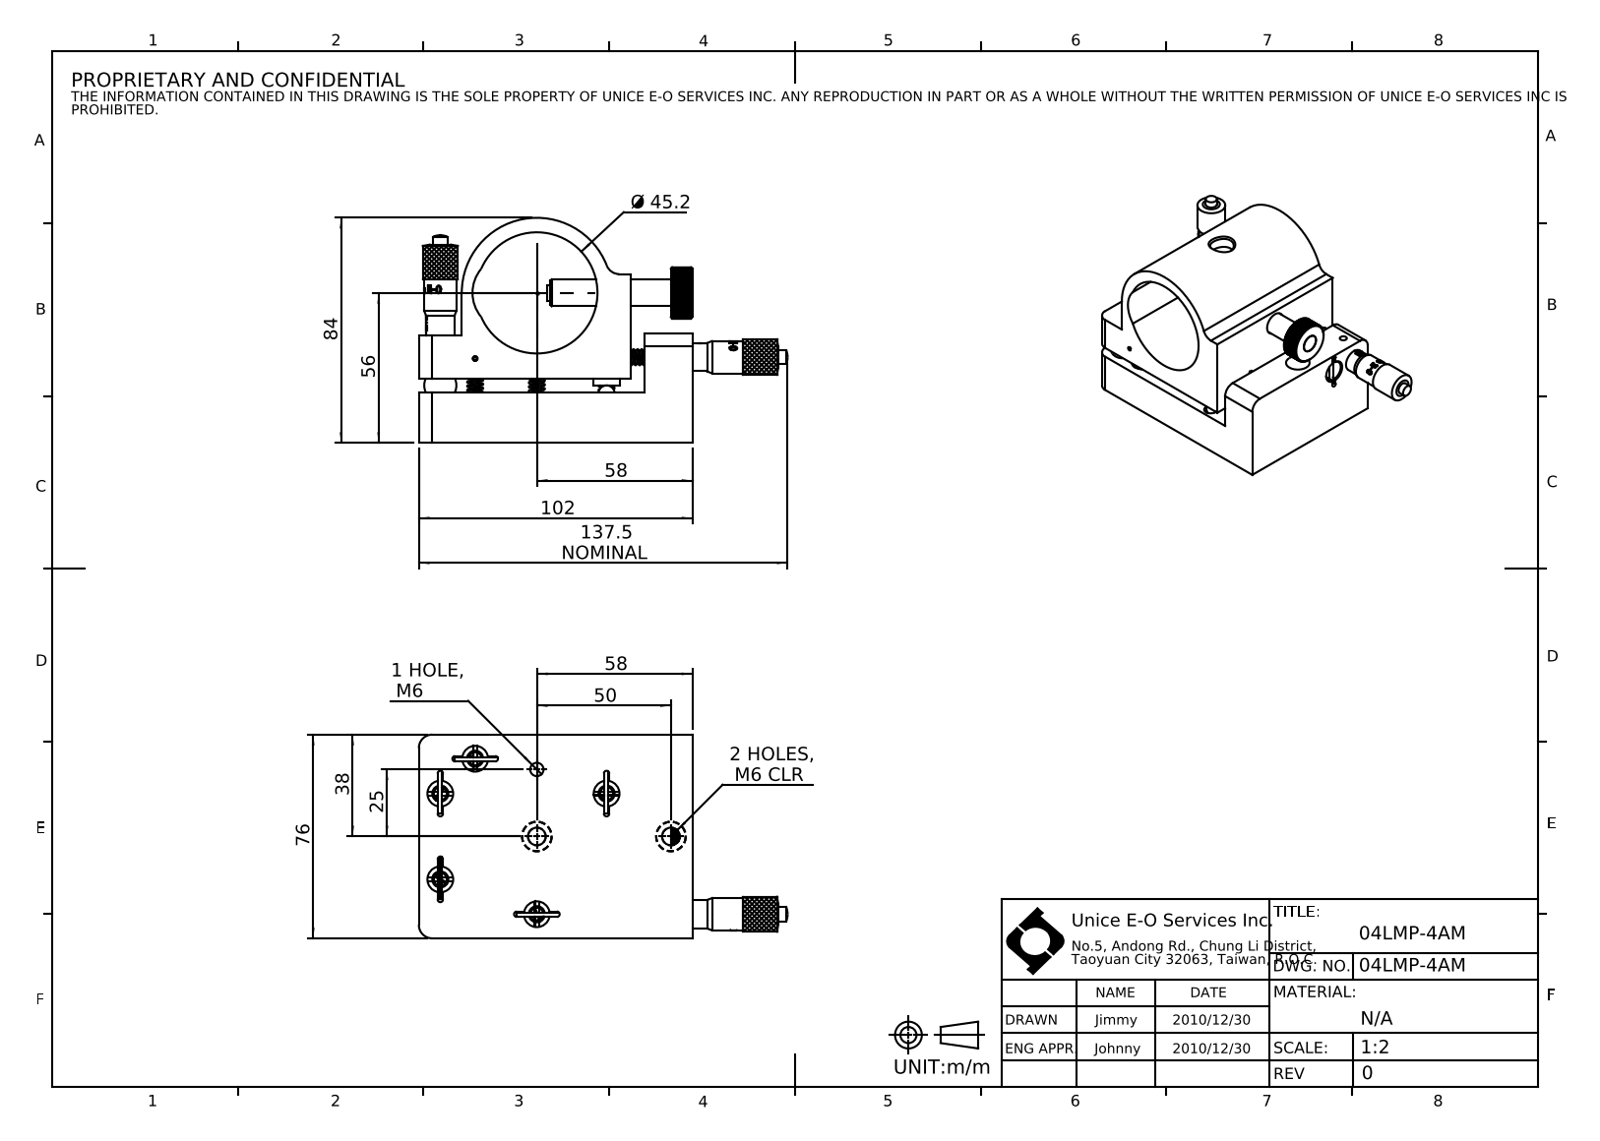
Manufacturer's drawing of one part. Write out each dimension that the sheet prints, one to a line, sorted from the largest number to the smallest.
137.5 NOMINAL
102
84
76
58
58
56
50
Ø 45.2
38
25
2 HOLES, M6 CLR
1 HOLE, M6
